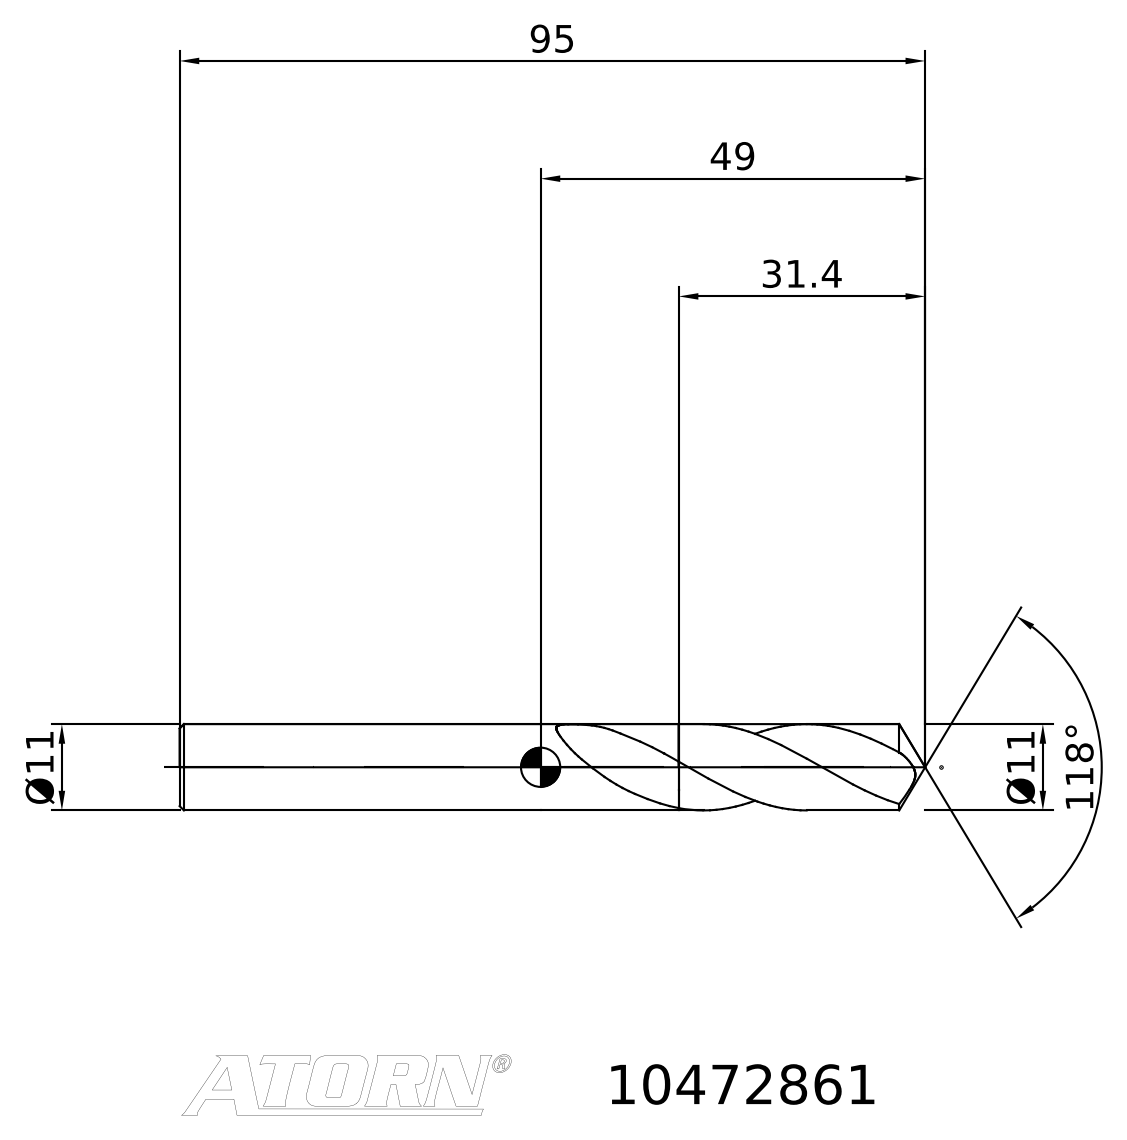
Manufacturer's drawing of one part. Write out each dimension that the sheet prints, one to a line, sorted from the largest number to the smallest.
118°
95
49
31.4
Ø11
Ø11
